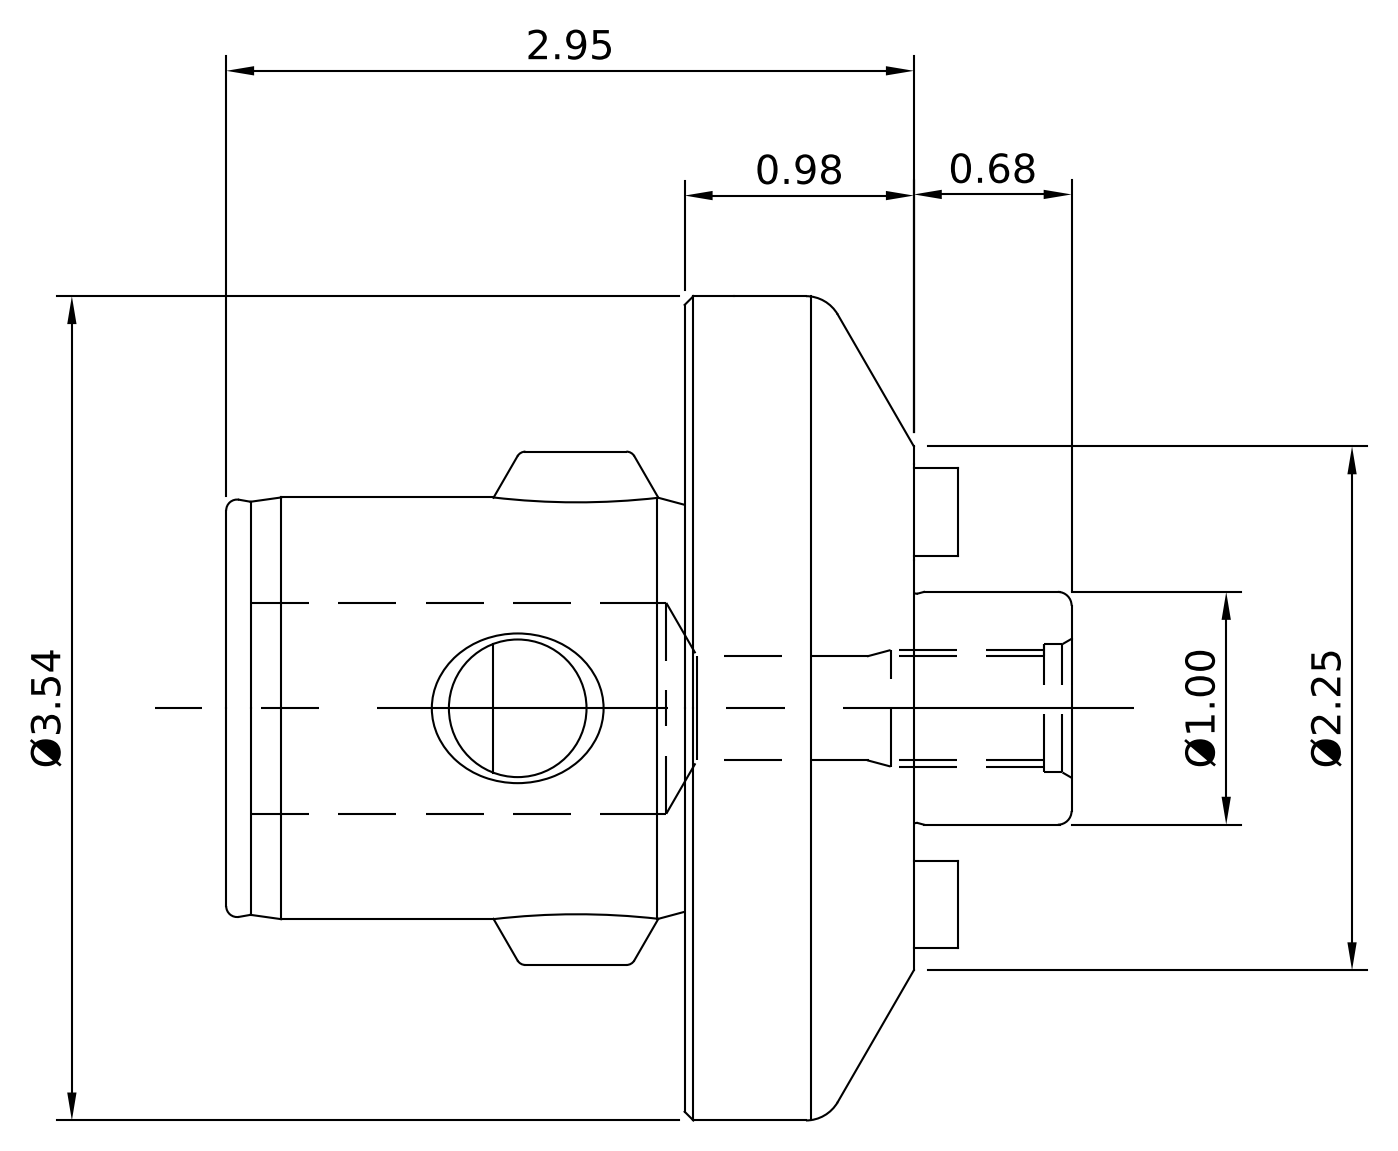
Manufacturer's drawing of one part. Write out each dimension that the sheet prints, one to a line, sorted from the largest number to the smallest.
Ø3.54
2.95
Ø2.25
Ø1.00
0.98
0.68
